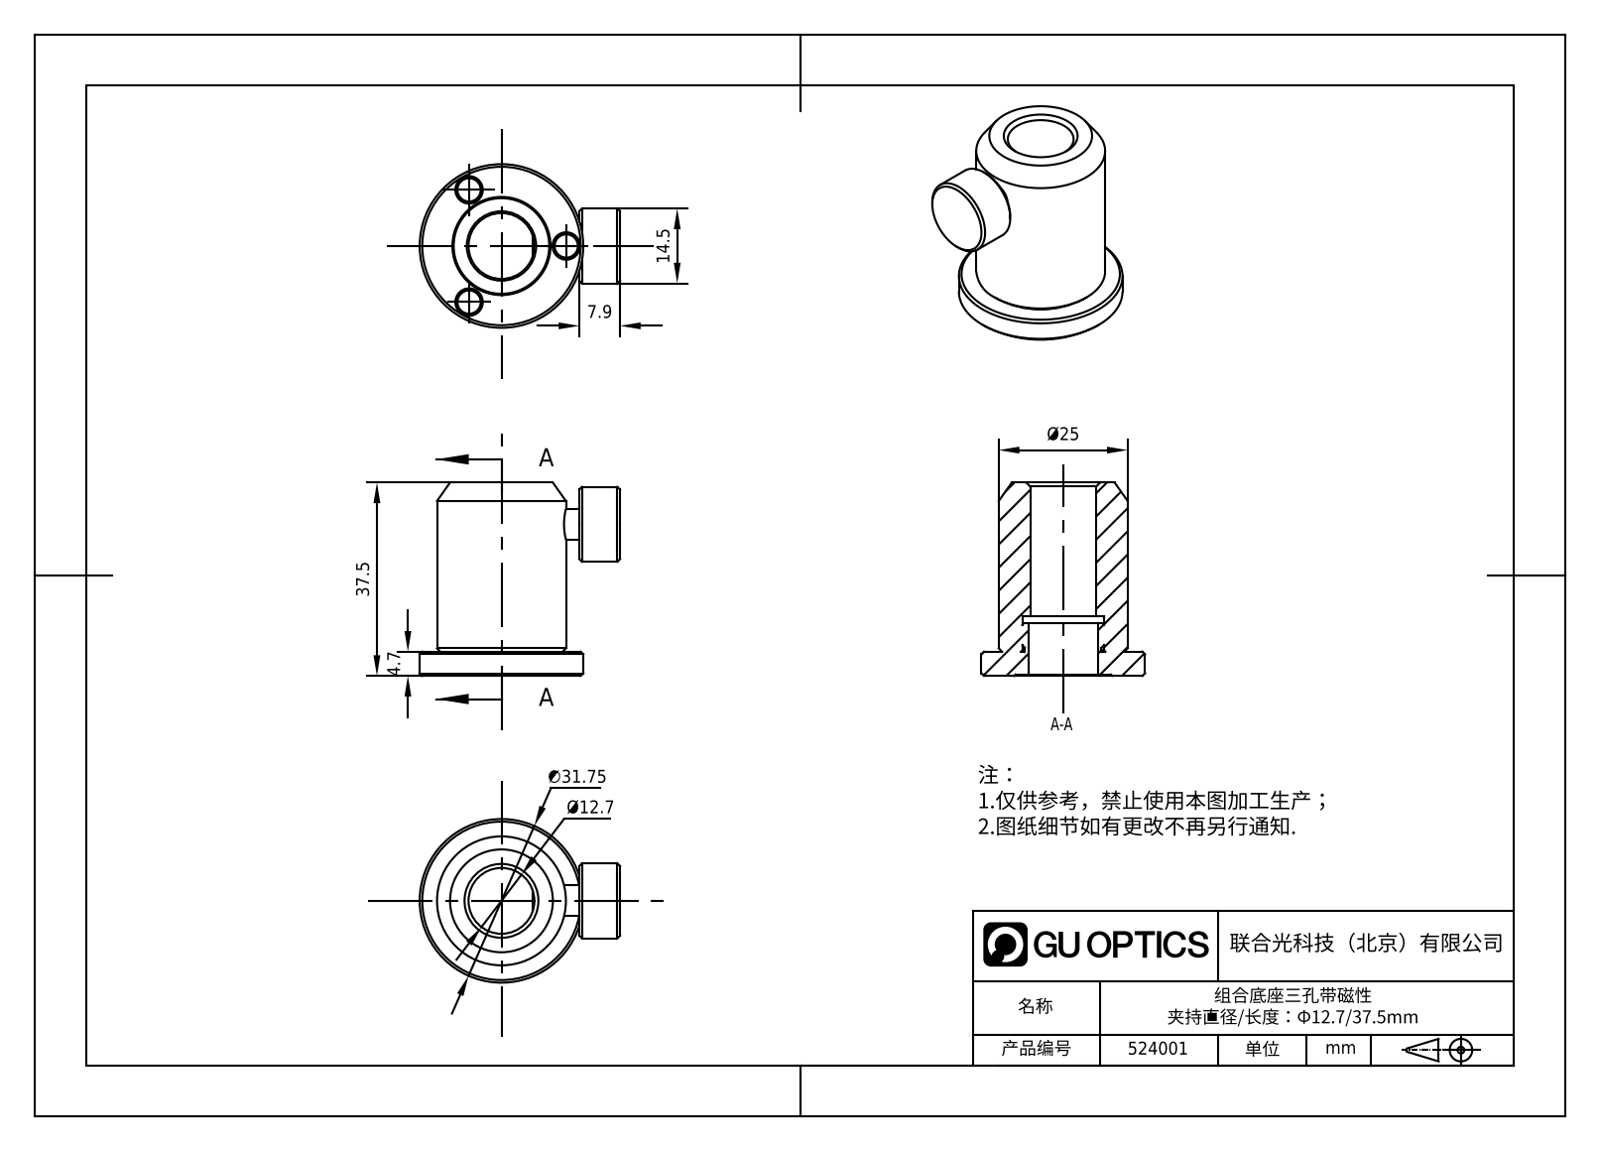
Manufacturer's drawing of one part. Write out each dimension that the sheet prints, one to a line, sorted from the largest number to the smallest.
37.5
∅31.75
Ø25
14.5
Ø12.7
7.9
4.7
